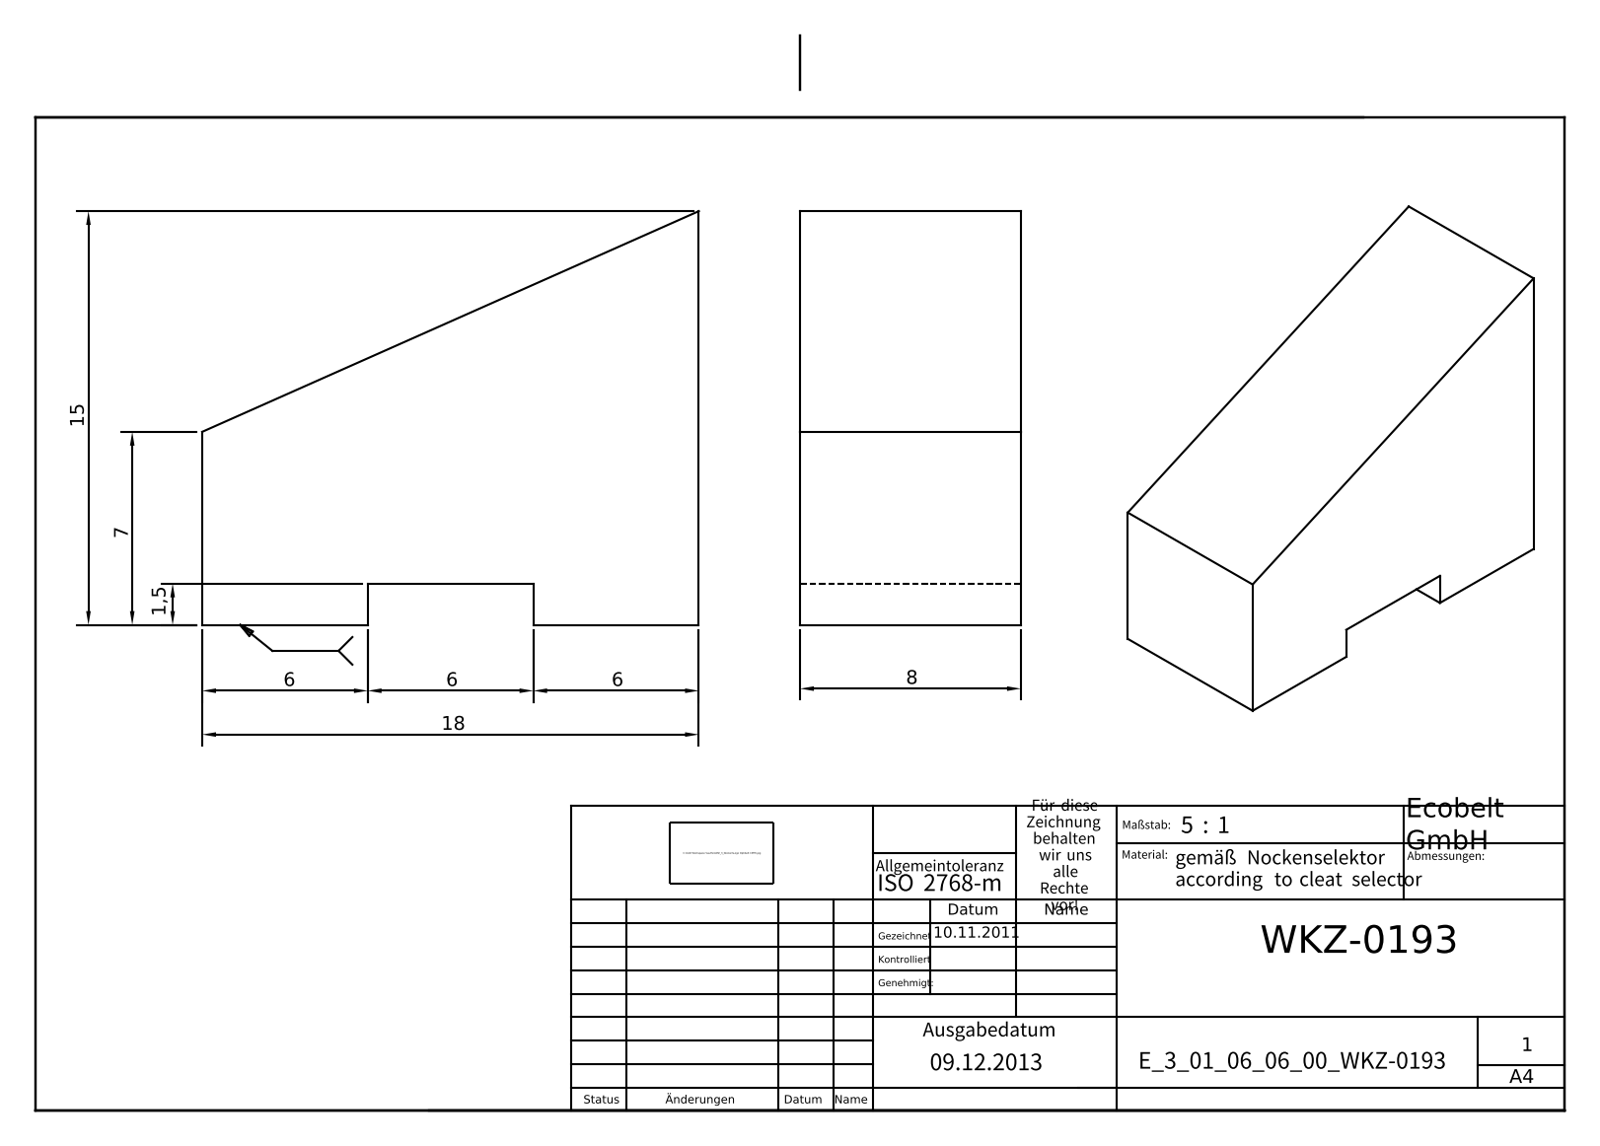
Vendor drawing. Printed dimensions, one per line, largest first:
18
15
8
7
6
6
6
1,5
